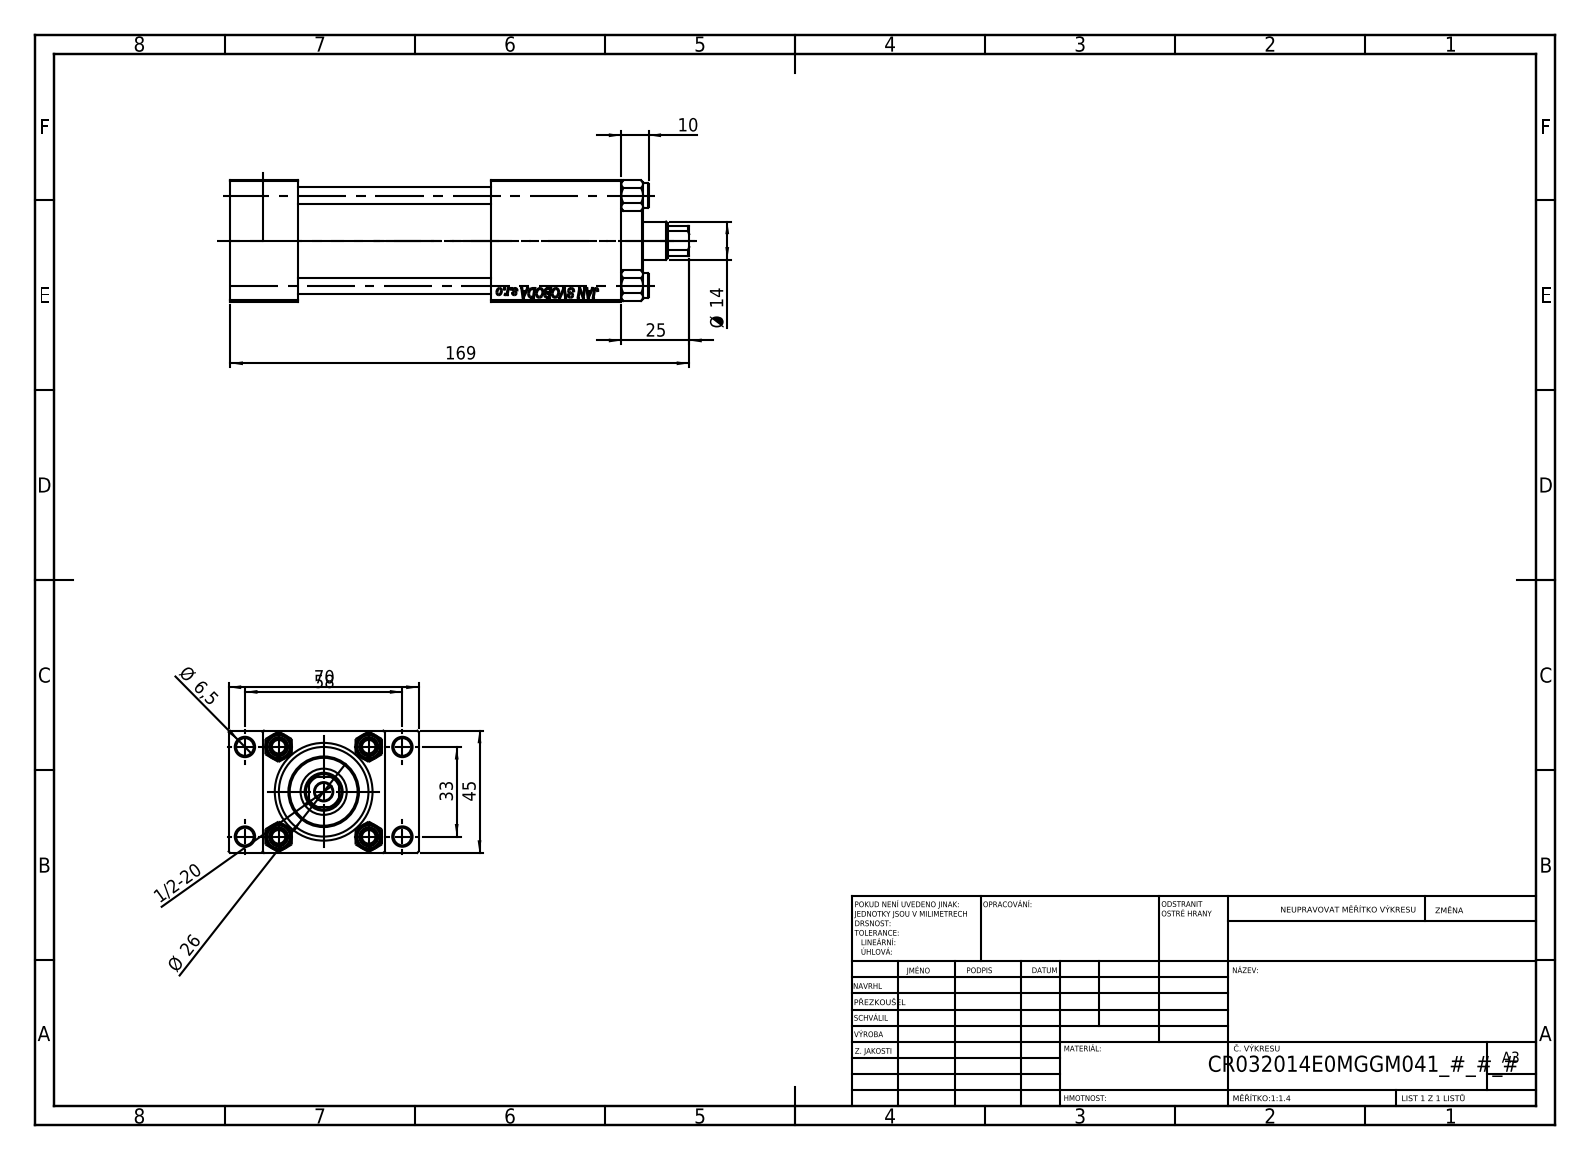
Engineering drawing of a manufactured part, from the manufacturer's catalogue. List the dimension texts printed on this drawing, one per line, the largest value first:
169
70
58
45
33
Ø 26
25
Ø 14
10
Ø 6,5
1/2-20
